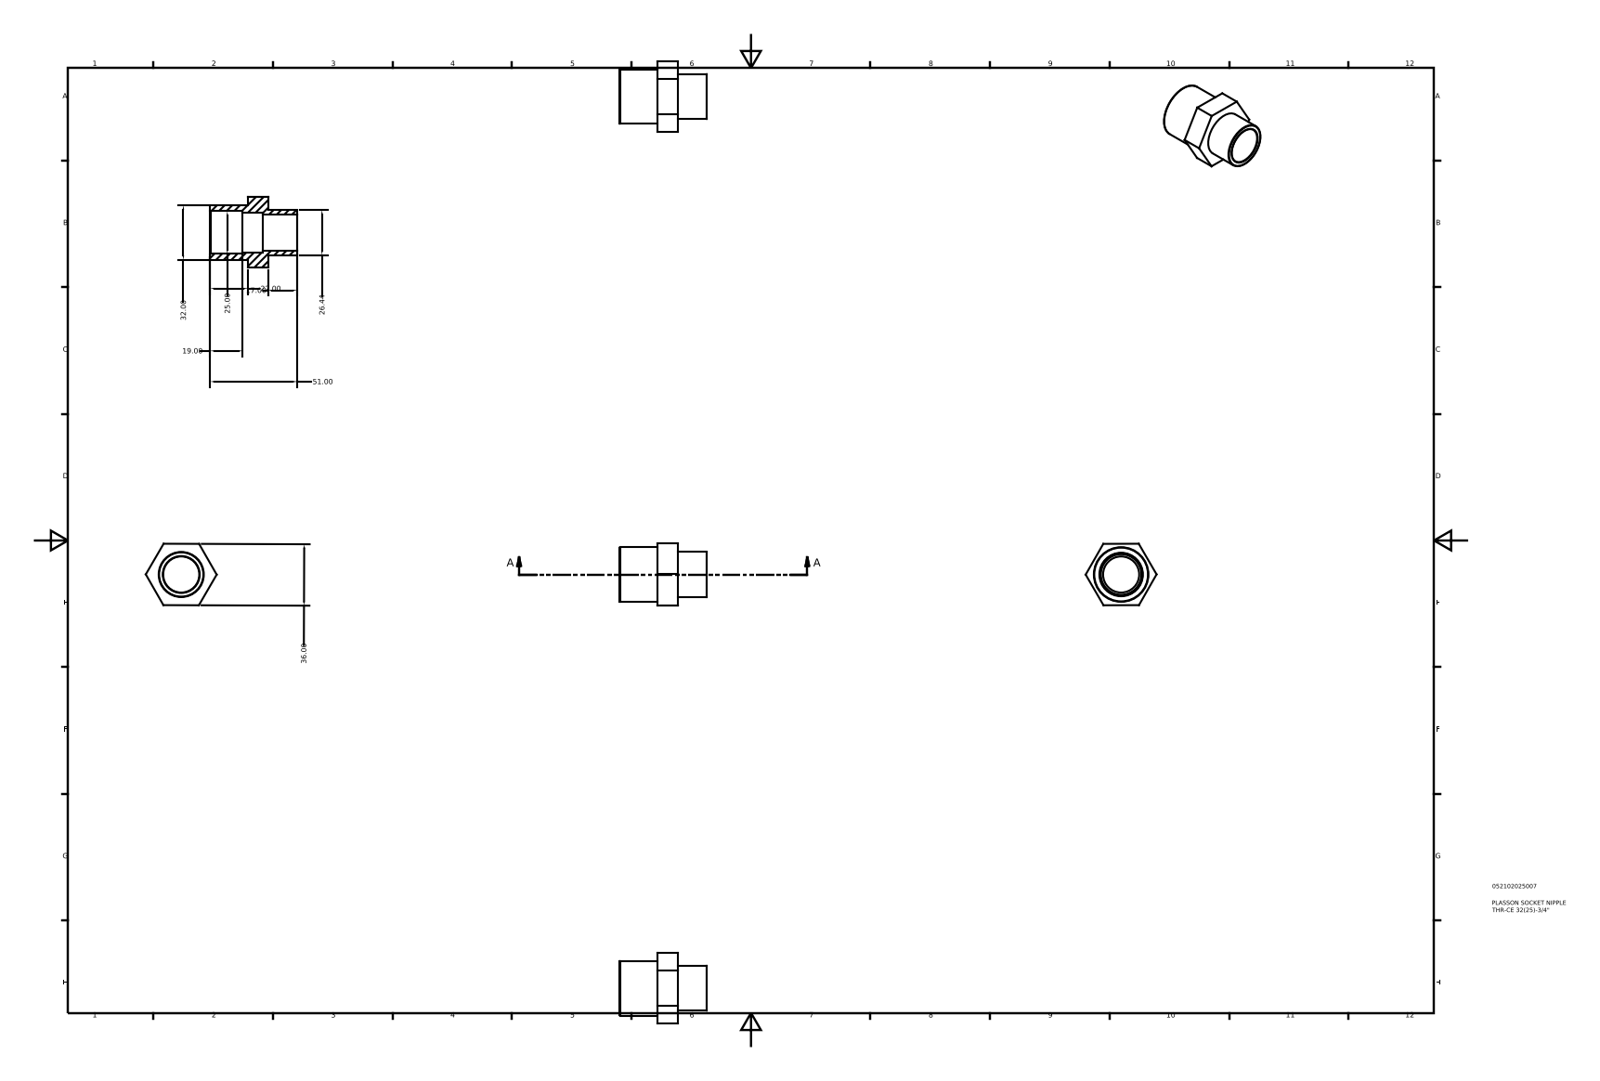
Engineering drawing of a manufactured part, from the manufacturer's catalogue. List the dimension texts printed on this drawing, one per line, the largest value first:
51.00
36.00
32.00
26.44
25.00
22.00
19.00
17.00
